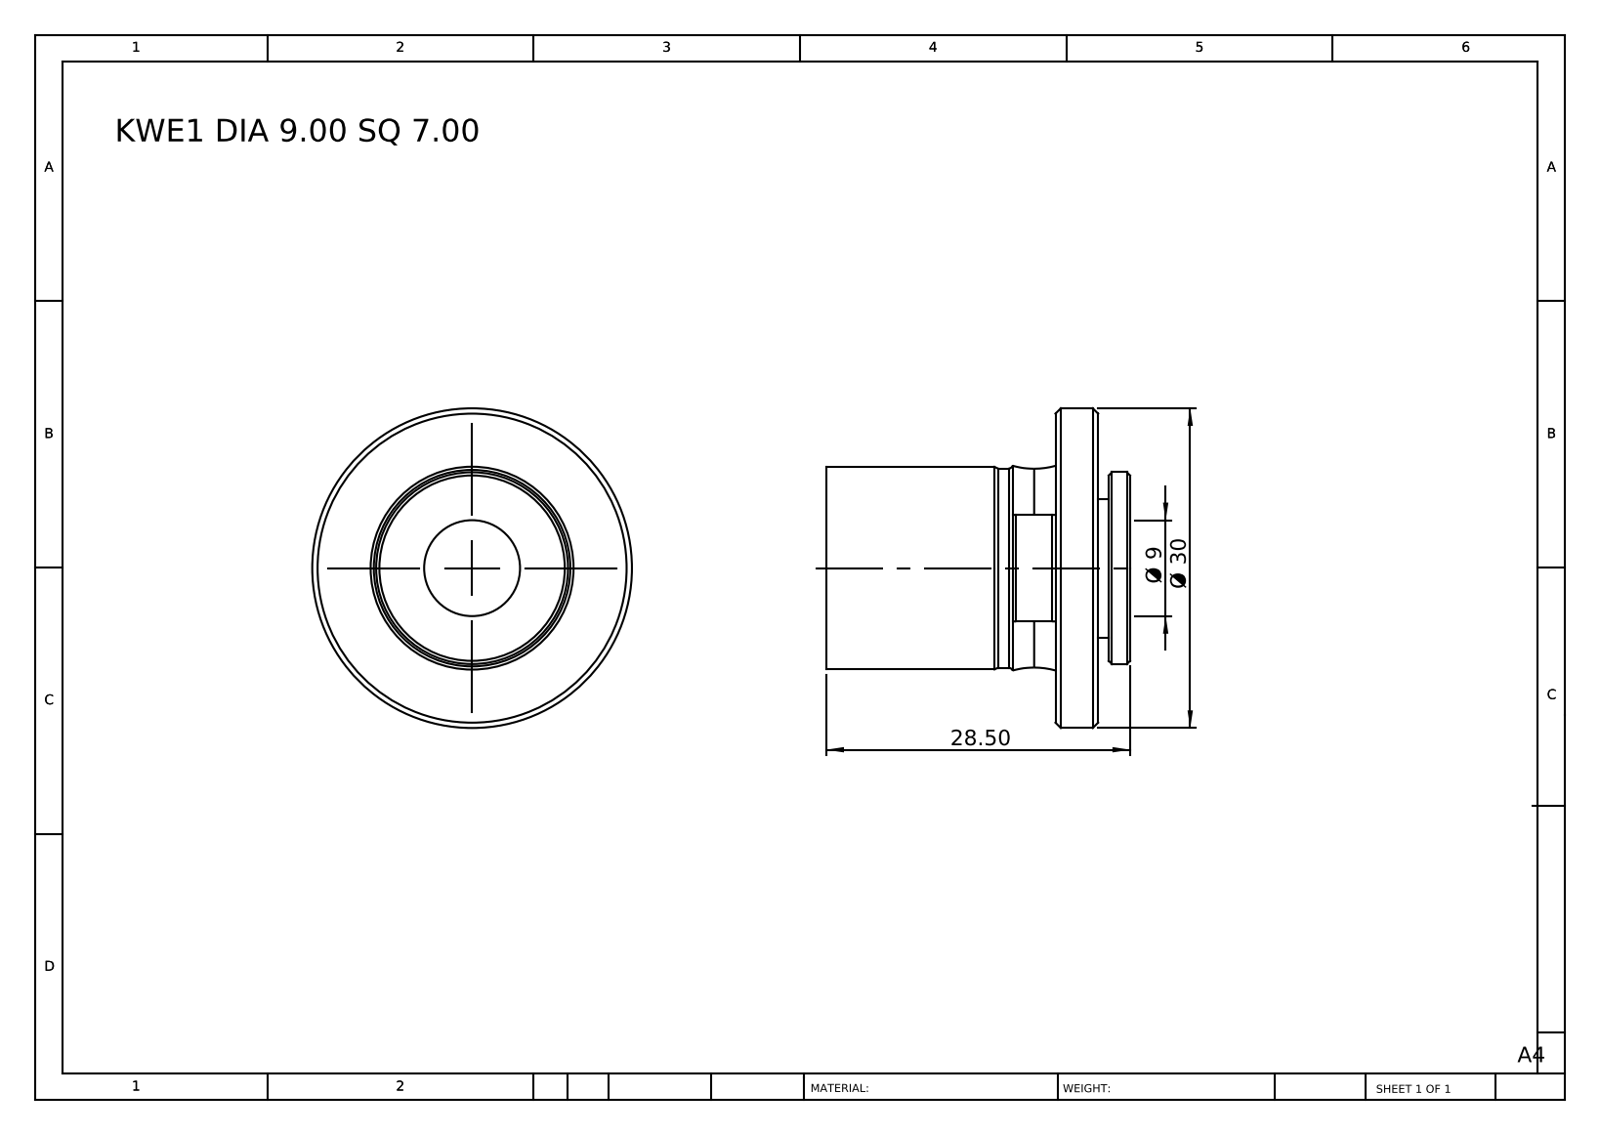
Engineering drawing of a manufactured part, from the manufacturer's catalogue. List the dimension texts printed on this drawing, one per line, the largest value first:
Ø 30
28.50
Ø 9
